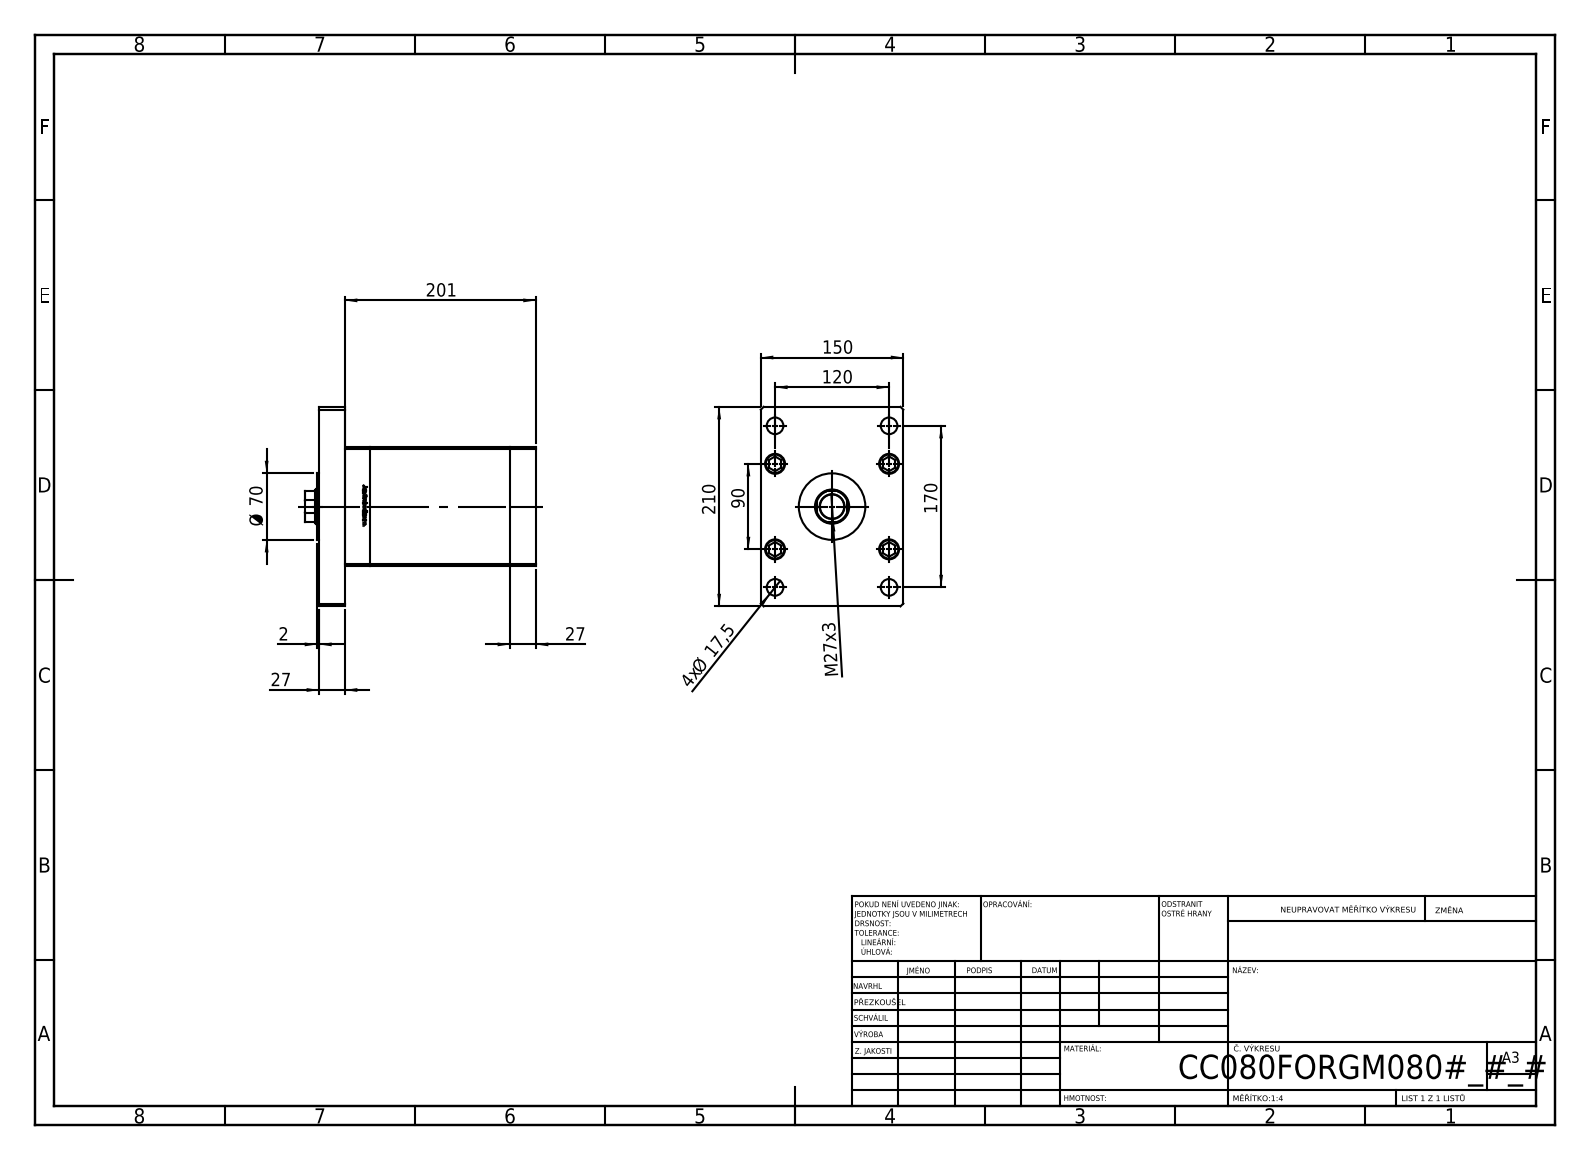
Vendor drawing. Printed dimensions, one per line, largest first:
210
201
170
150
120
90
Ø 70
27
27
M27x3
4x Ø 17,5
2
